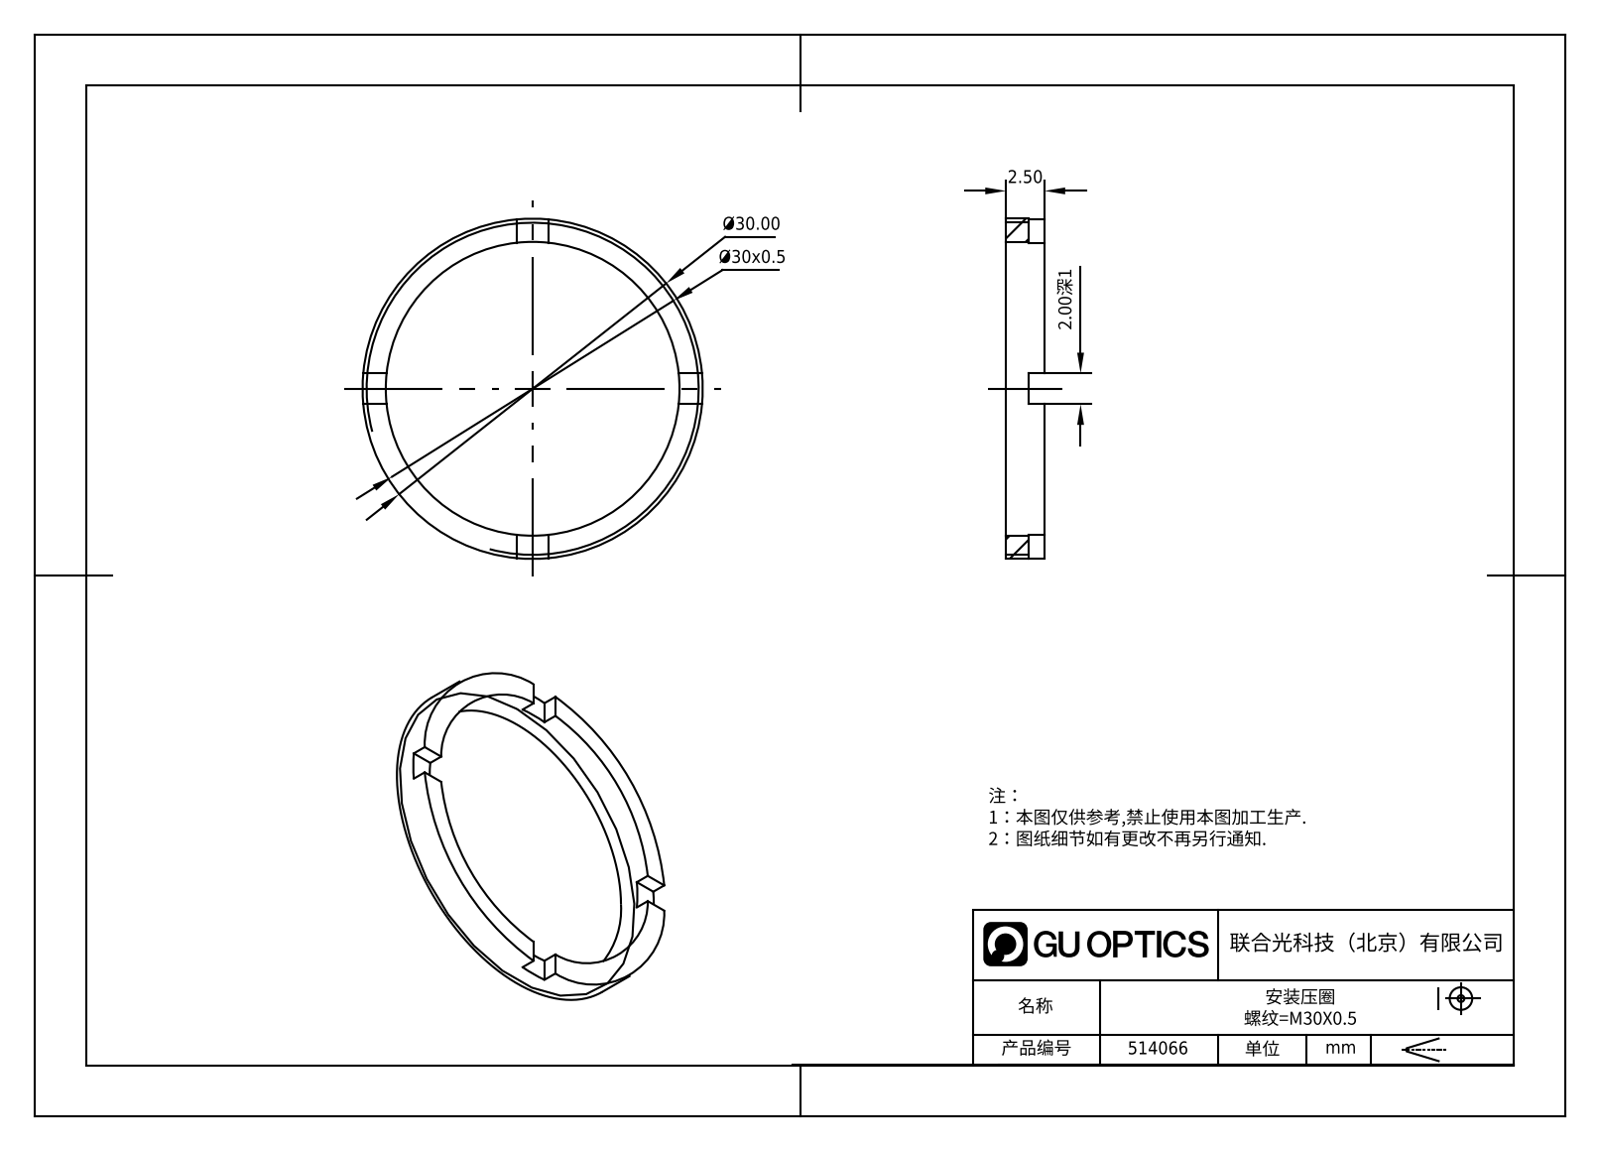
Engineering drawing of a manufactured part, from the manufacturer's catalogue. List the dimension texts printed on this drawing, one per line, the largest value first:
Ø30.00
Ø30x0.5
2.50
2.00深1
